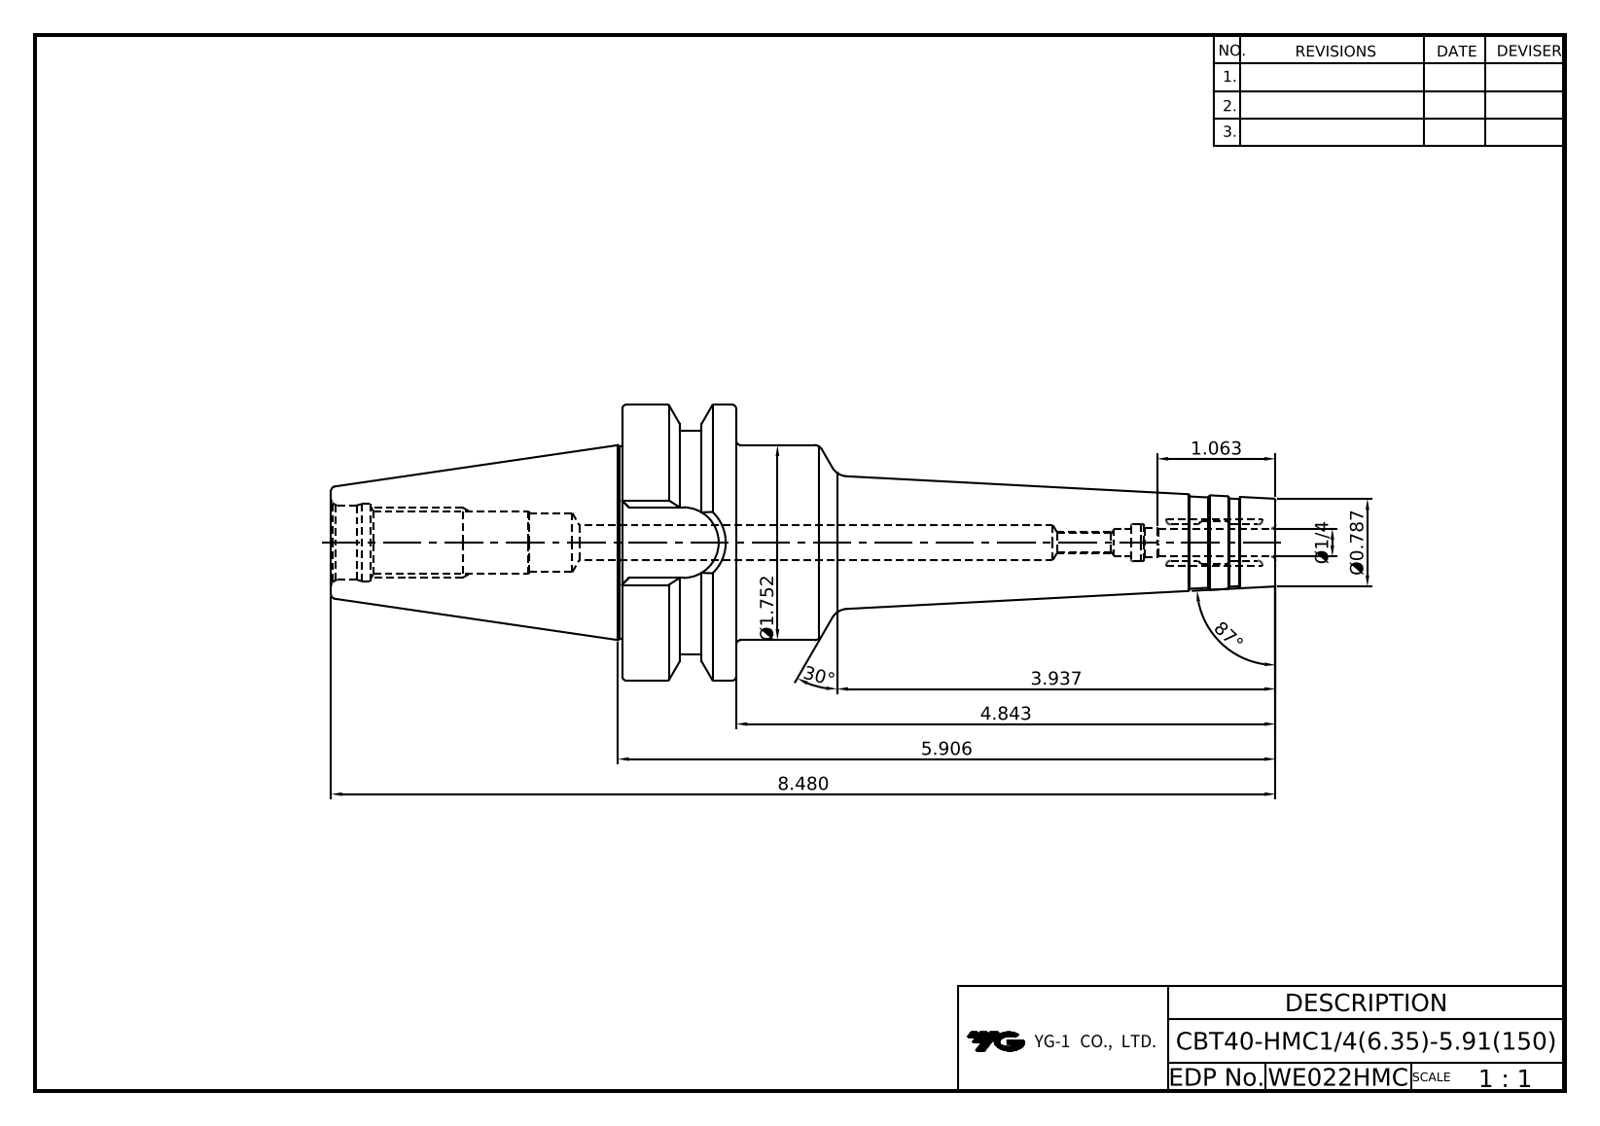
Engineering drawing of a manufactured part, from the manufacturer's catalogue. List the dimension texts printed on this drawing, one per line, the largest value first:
87°
30°
8.480
5.906
4.843
3.937
Ø1.752
1.063
Ø0.787
Ø1/4
